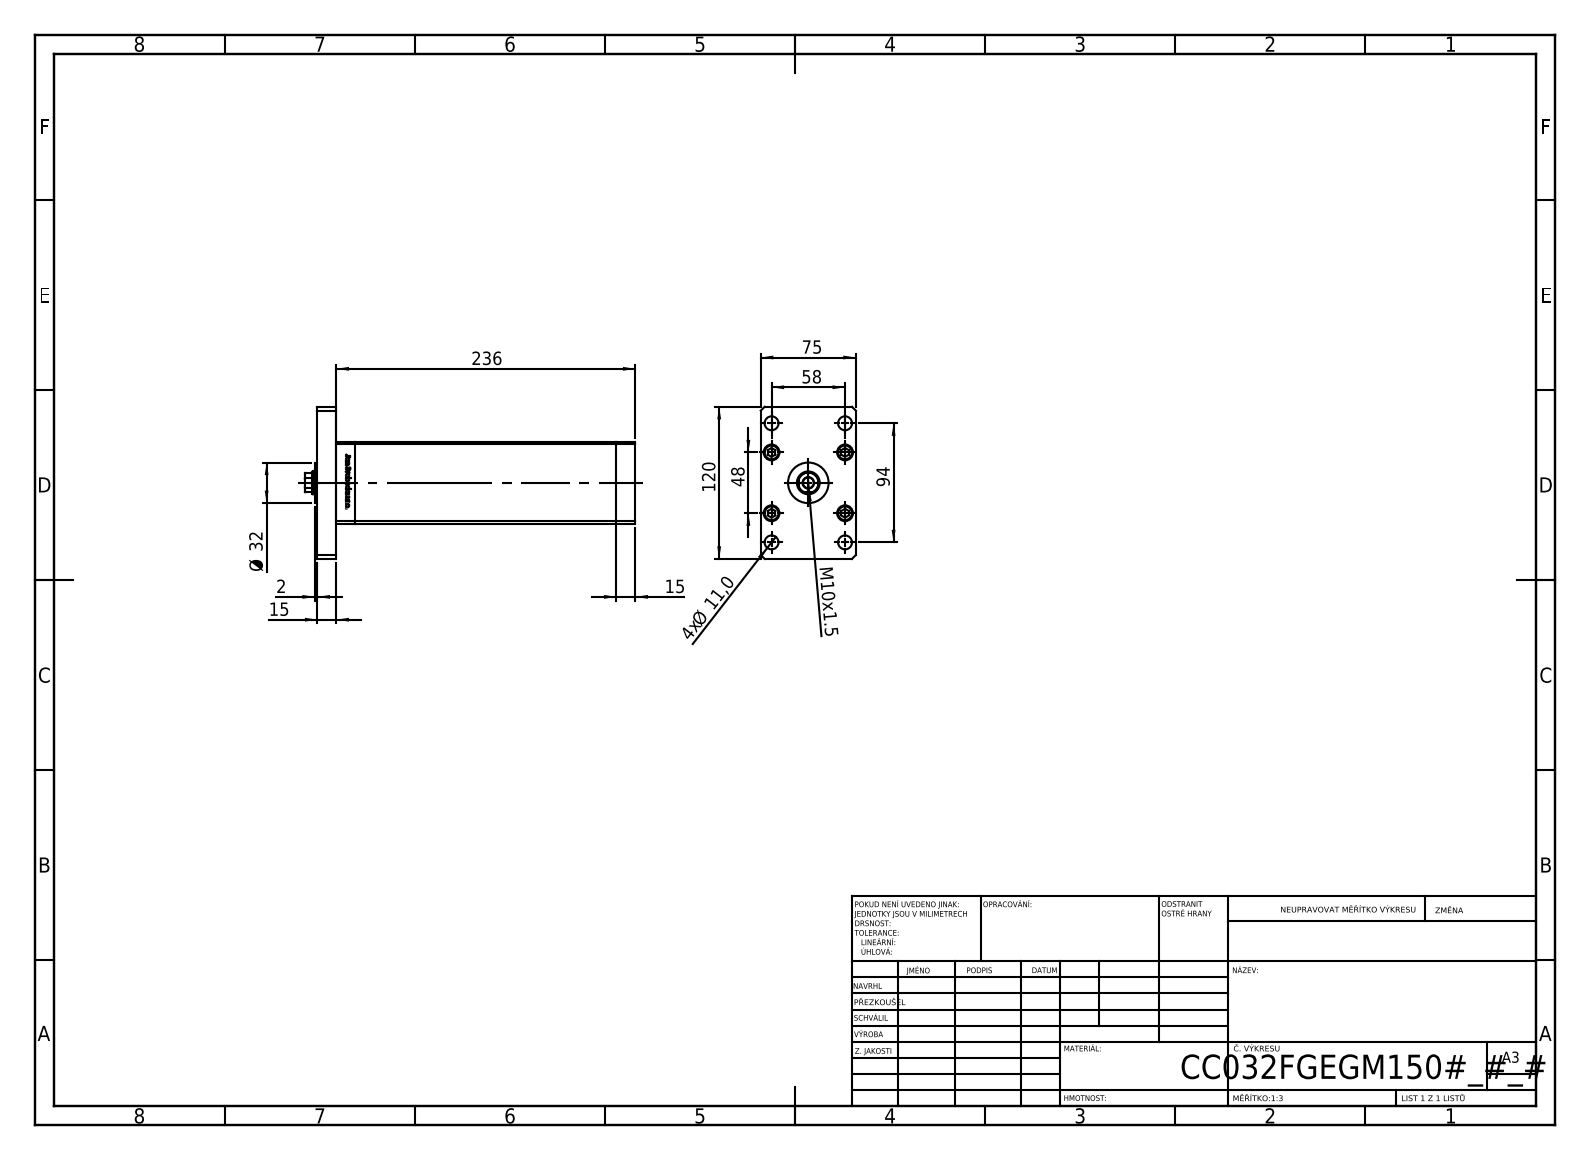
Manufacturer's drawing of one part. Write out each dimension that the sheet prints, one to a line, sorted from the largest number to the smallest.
236
120
94
75
58
48
Ø 32
15
15
4x Ø 11,0
M10x1.5
2
